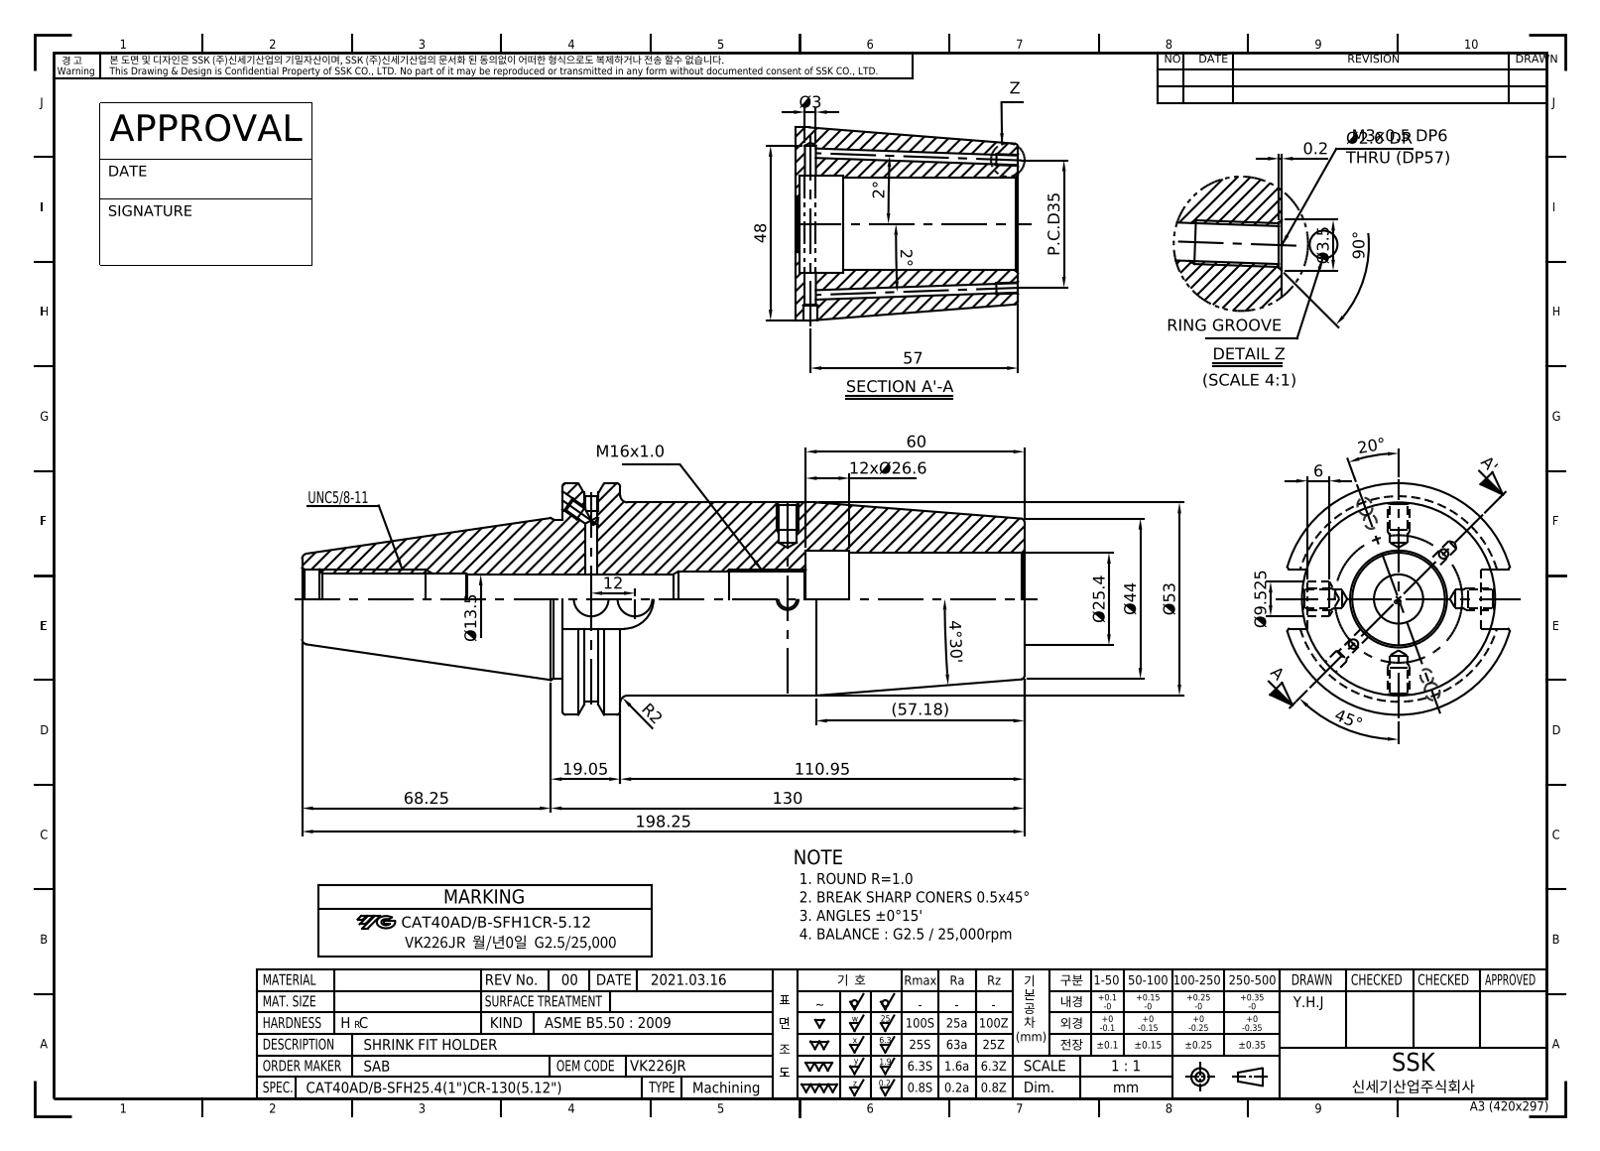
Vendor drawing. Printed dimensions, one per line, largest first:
198.25
130
110.95
90°
68.25
60
(57.18)
57
Ø53
48
45°
Ø44
P.C.D35
12xØ26.6
Ø25.4
20°
19.05
Ø13.5
12
Ø9.525
6
4°30'
Ø3.5
Ø3
R2
2°
2°
0.2
